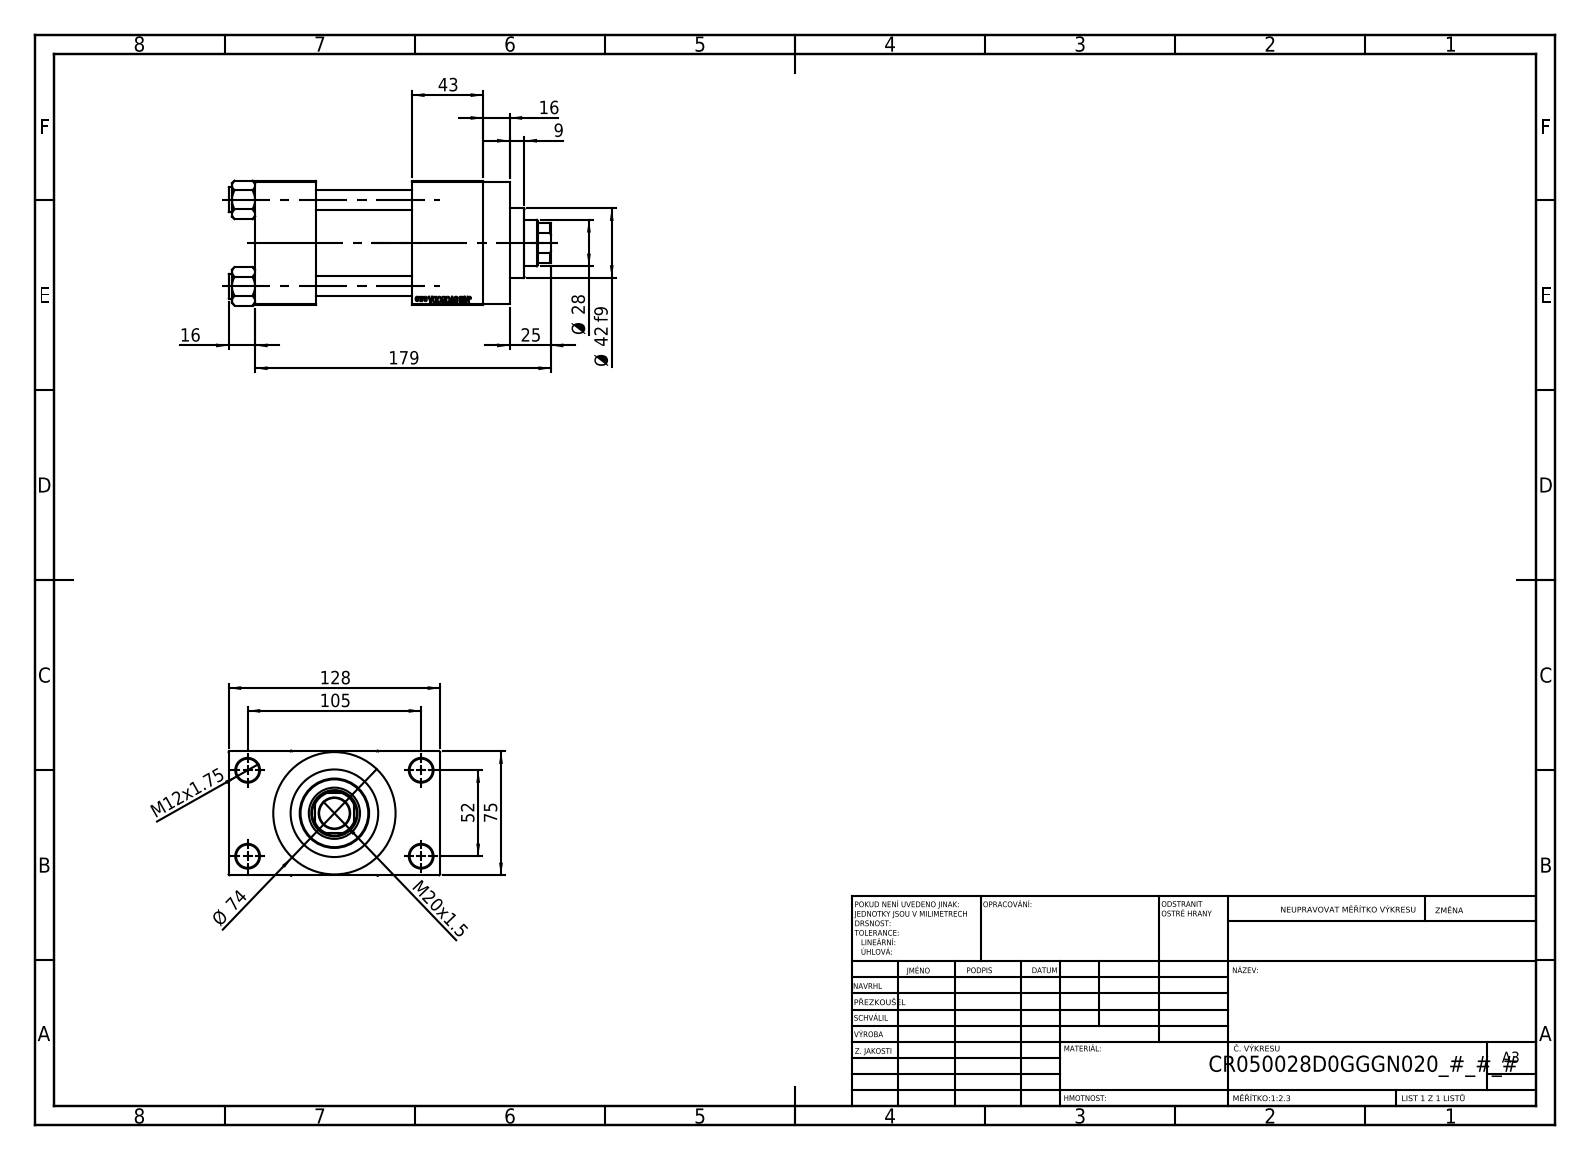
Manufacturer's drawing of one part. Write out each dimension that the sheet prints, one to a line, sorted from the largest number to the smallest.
179
128
105
75
Ø 74
52
43
Ø 42 f9
Ø 28
25
M20x1.5
16
16
M12x1.75
9
